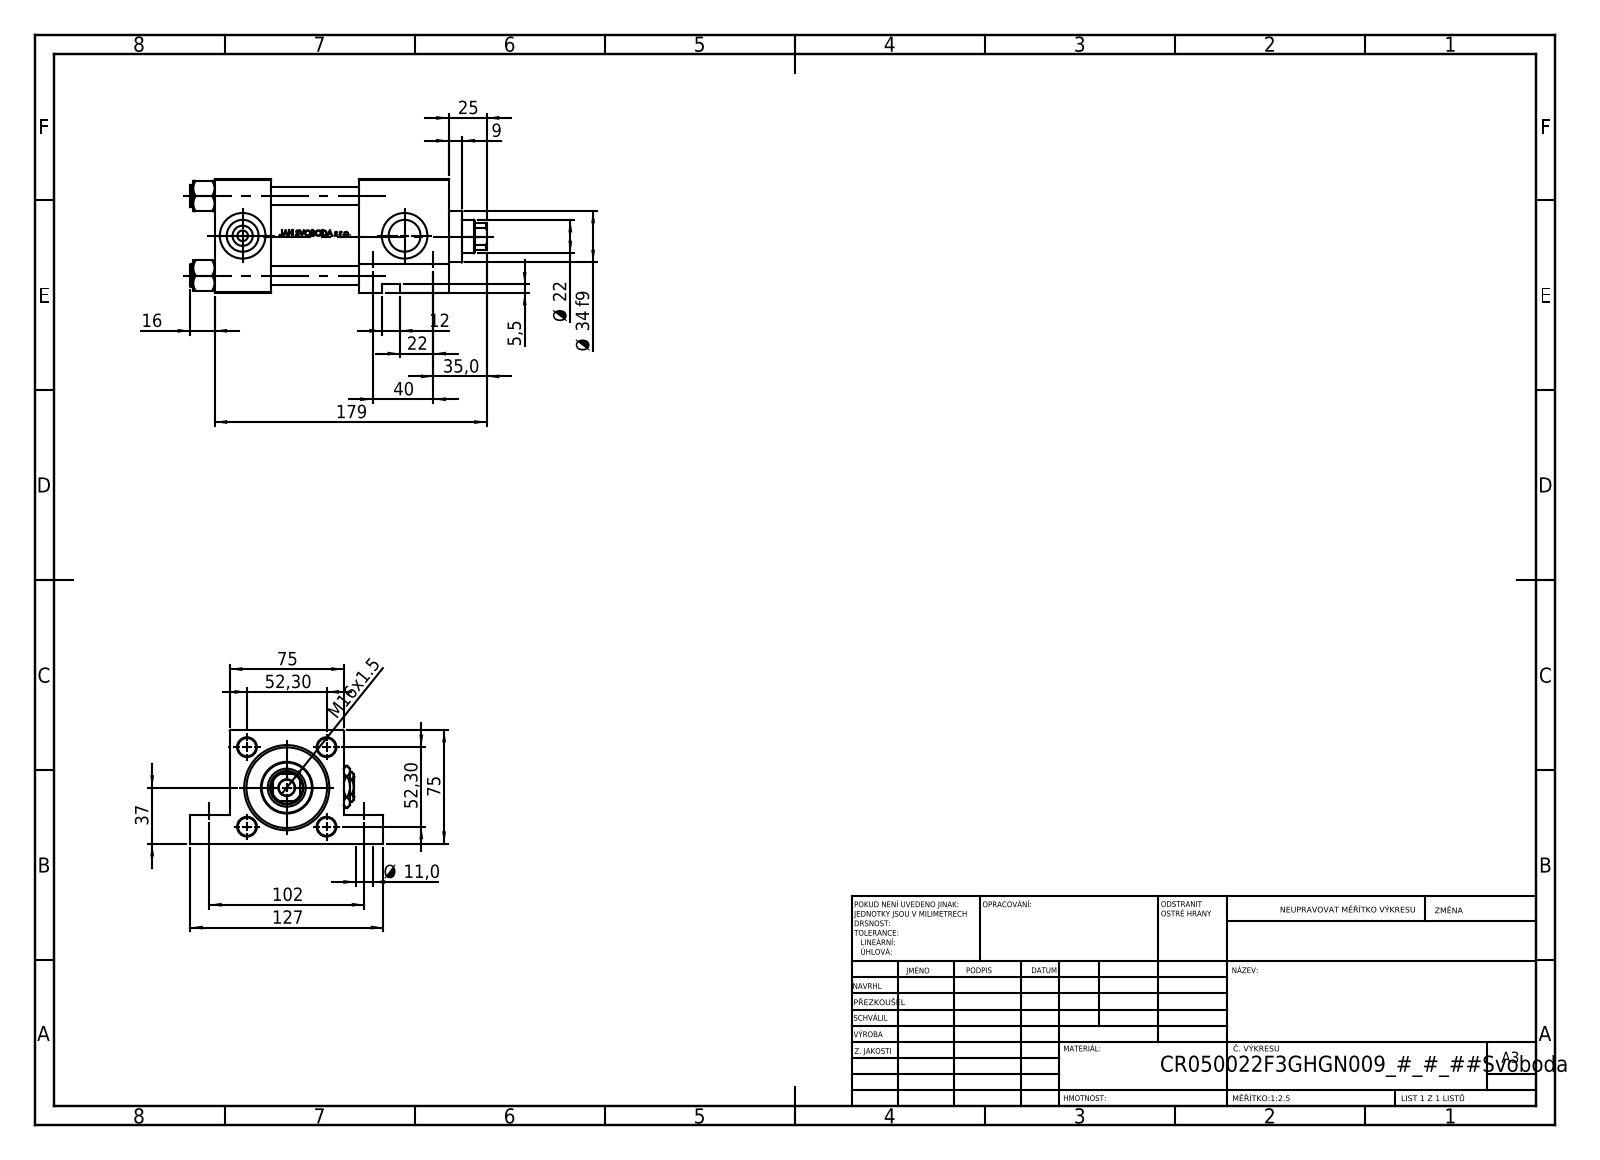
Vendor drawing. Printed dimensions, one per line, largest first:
179
127
102
75
75
52,30
52,30
40
37
35,0
Ø 34 f9
25
Ø 22
22
16
M16x1.5
12
Ø 11,0
9
5,5
